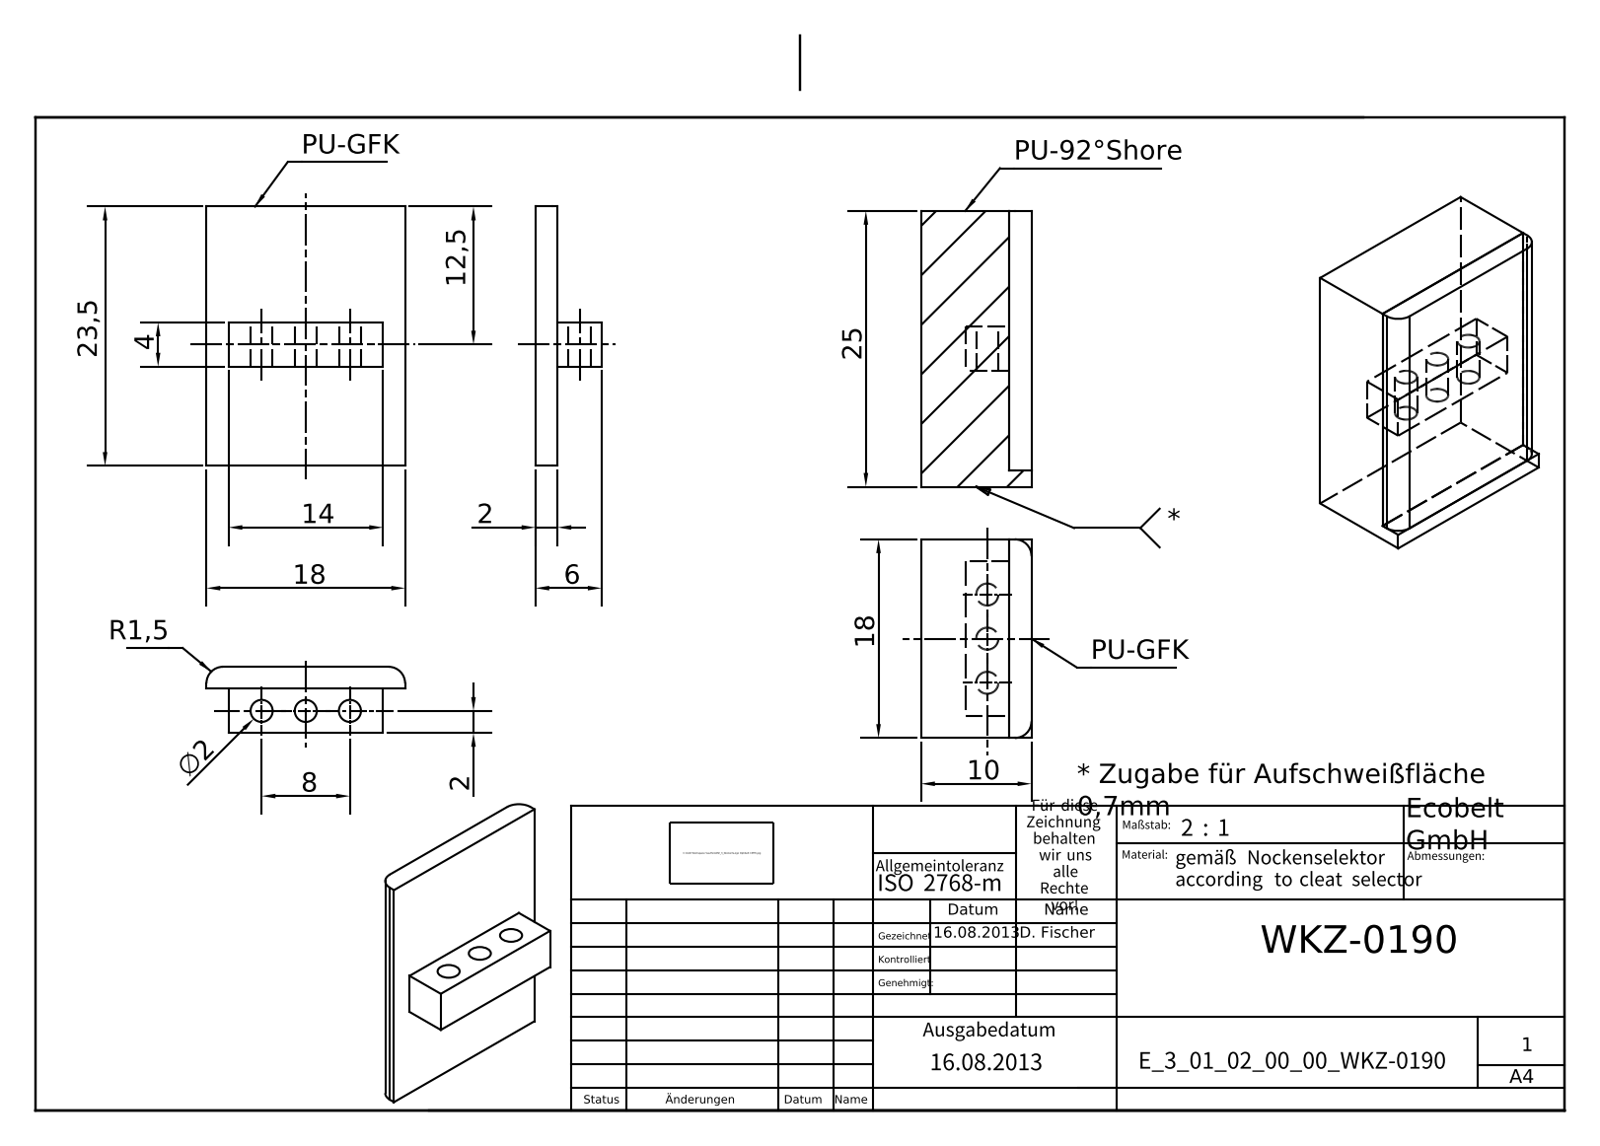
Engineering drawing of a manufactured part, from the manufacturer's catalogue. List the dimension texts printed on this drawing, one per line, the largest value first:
25
23,5
18
18
14
12,5
10
8
6
4
2
∅2
2
